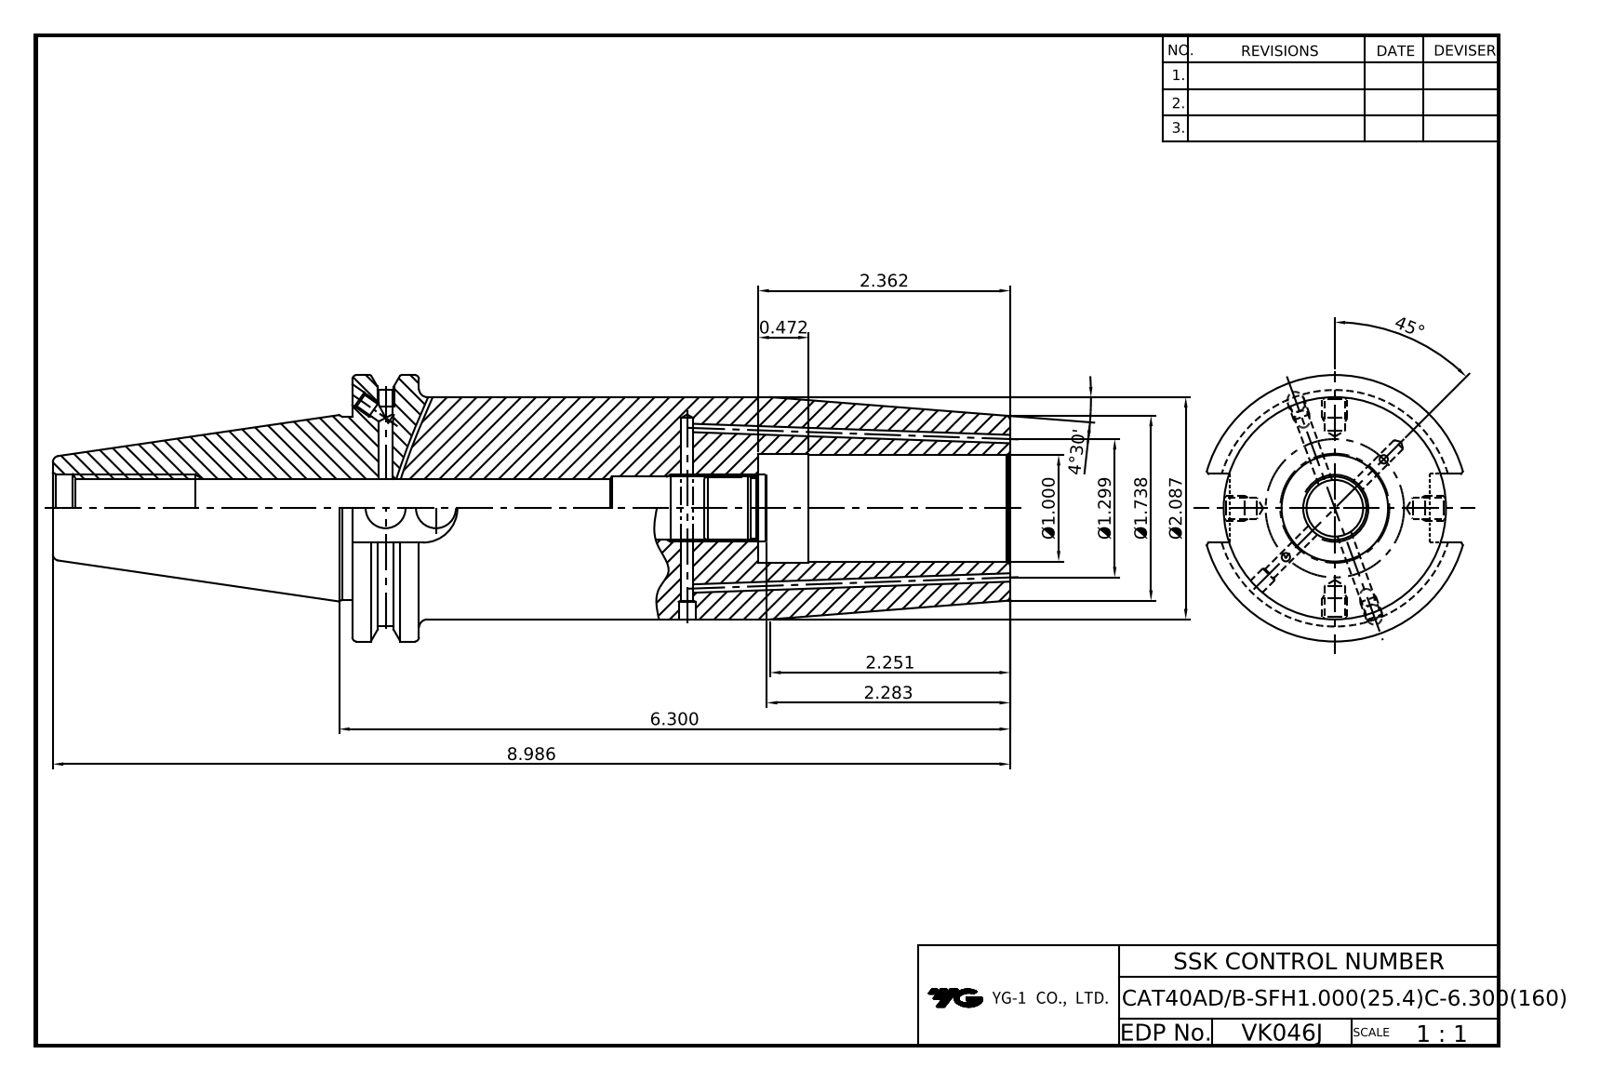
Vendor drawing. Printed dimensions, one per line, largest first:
45°
8.986
6.300
4°30'
2.362
2.283
2.251
Ø2.087
Ø1.738
Ø1.299
Ø1.000
0.472
